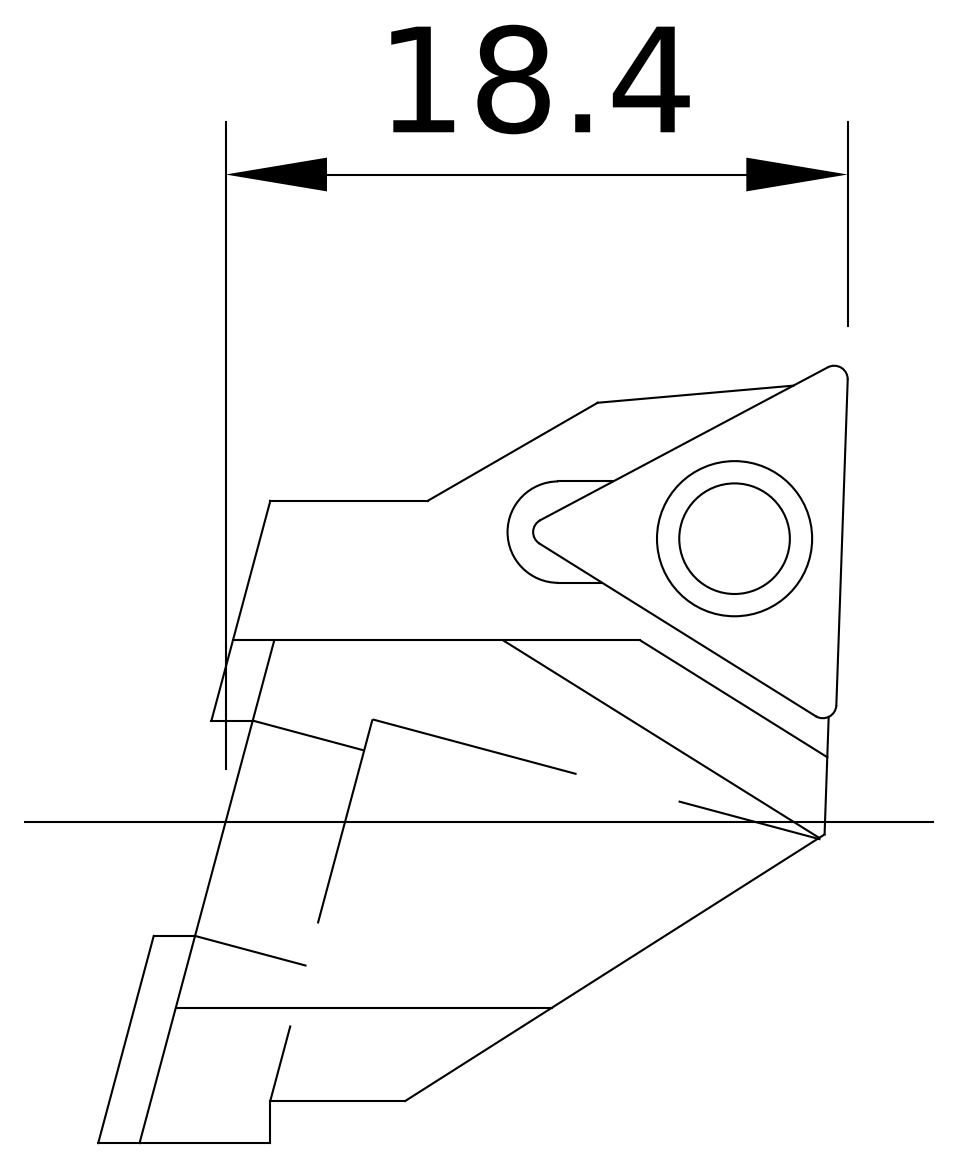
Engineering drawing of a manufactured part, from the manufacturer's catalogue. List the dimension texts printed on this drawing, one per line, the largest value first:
18.4
